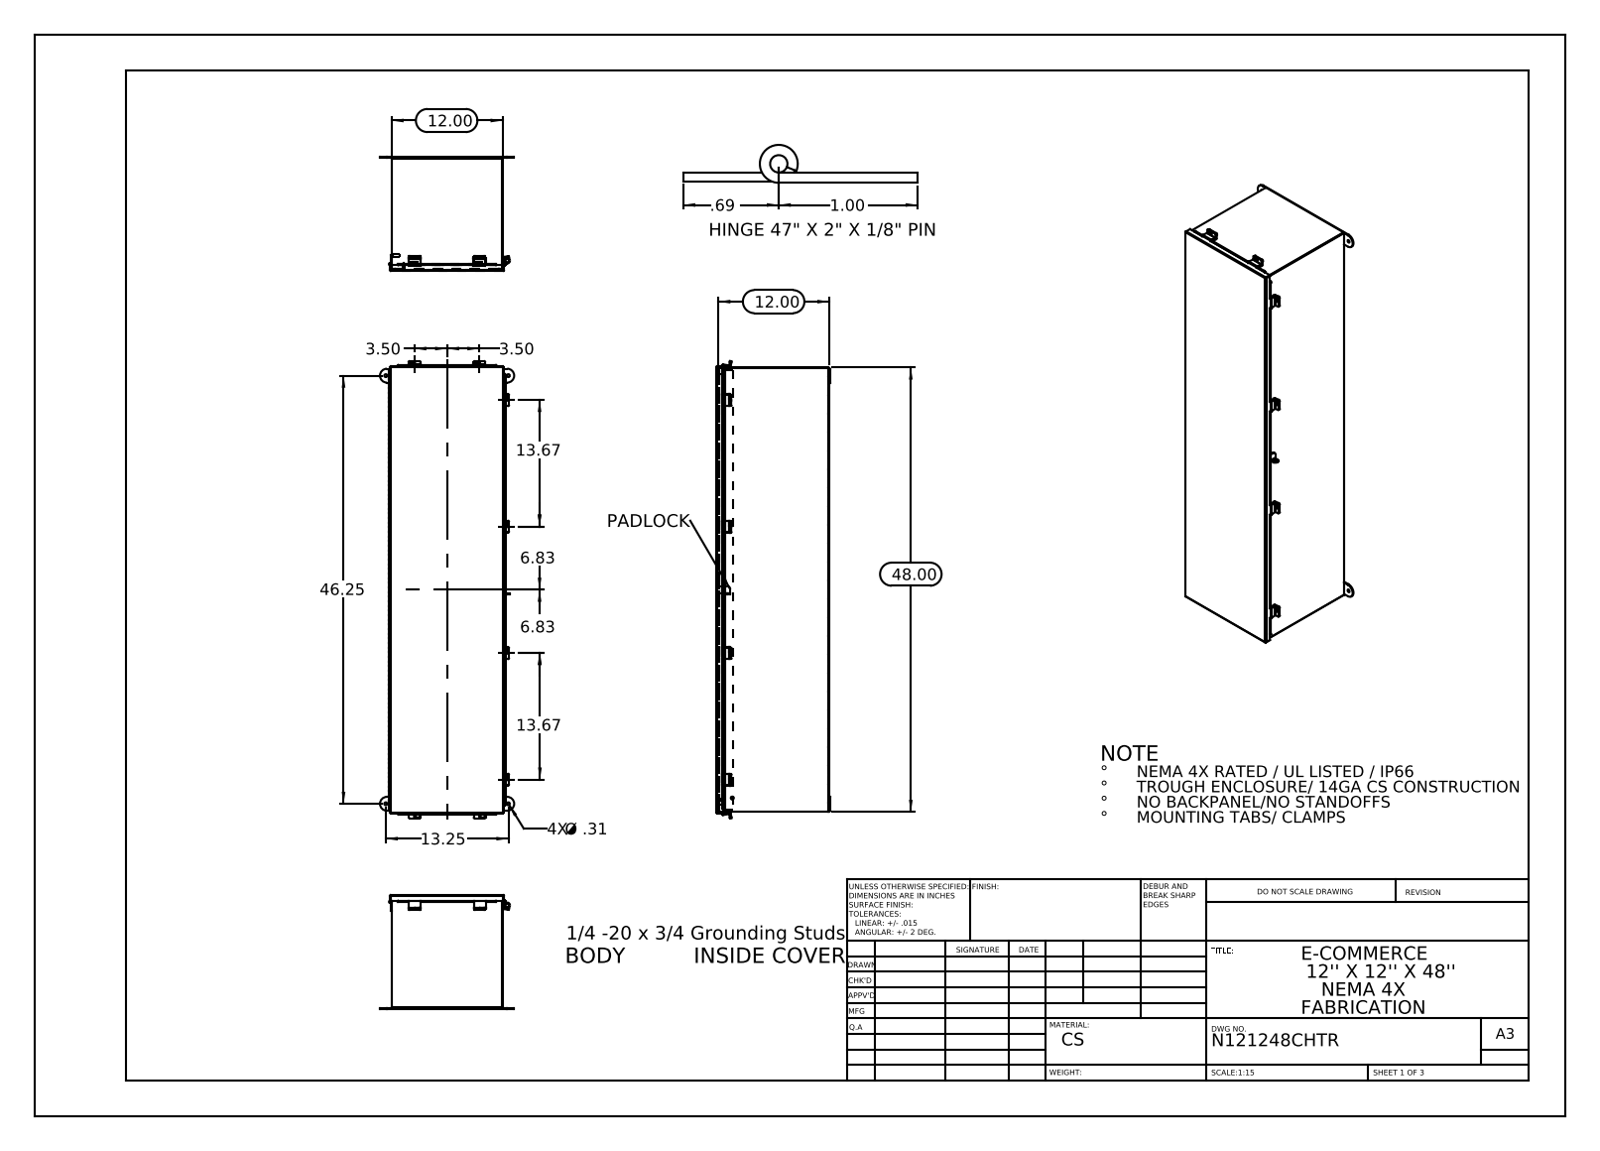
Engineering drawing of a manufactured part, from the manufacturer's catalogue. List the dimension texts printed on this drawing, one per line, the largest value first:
48.00
46.25
13.67
13.67
13.25
12.00
12.00
6.83
6.83
3.50
3.50
1.00
.69
4X Ø .31
